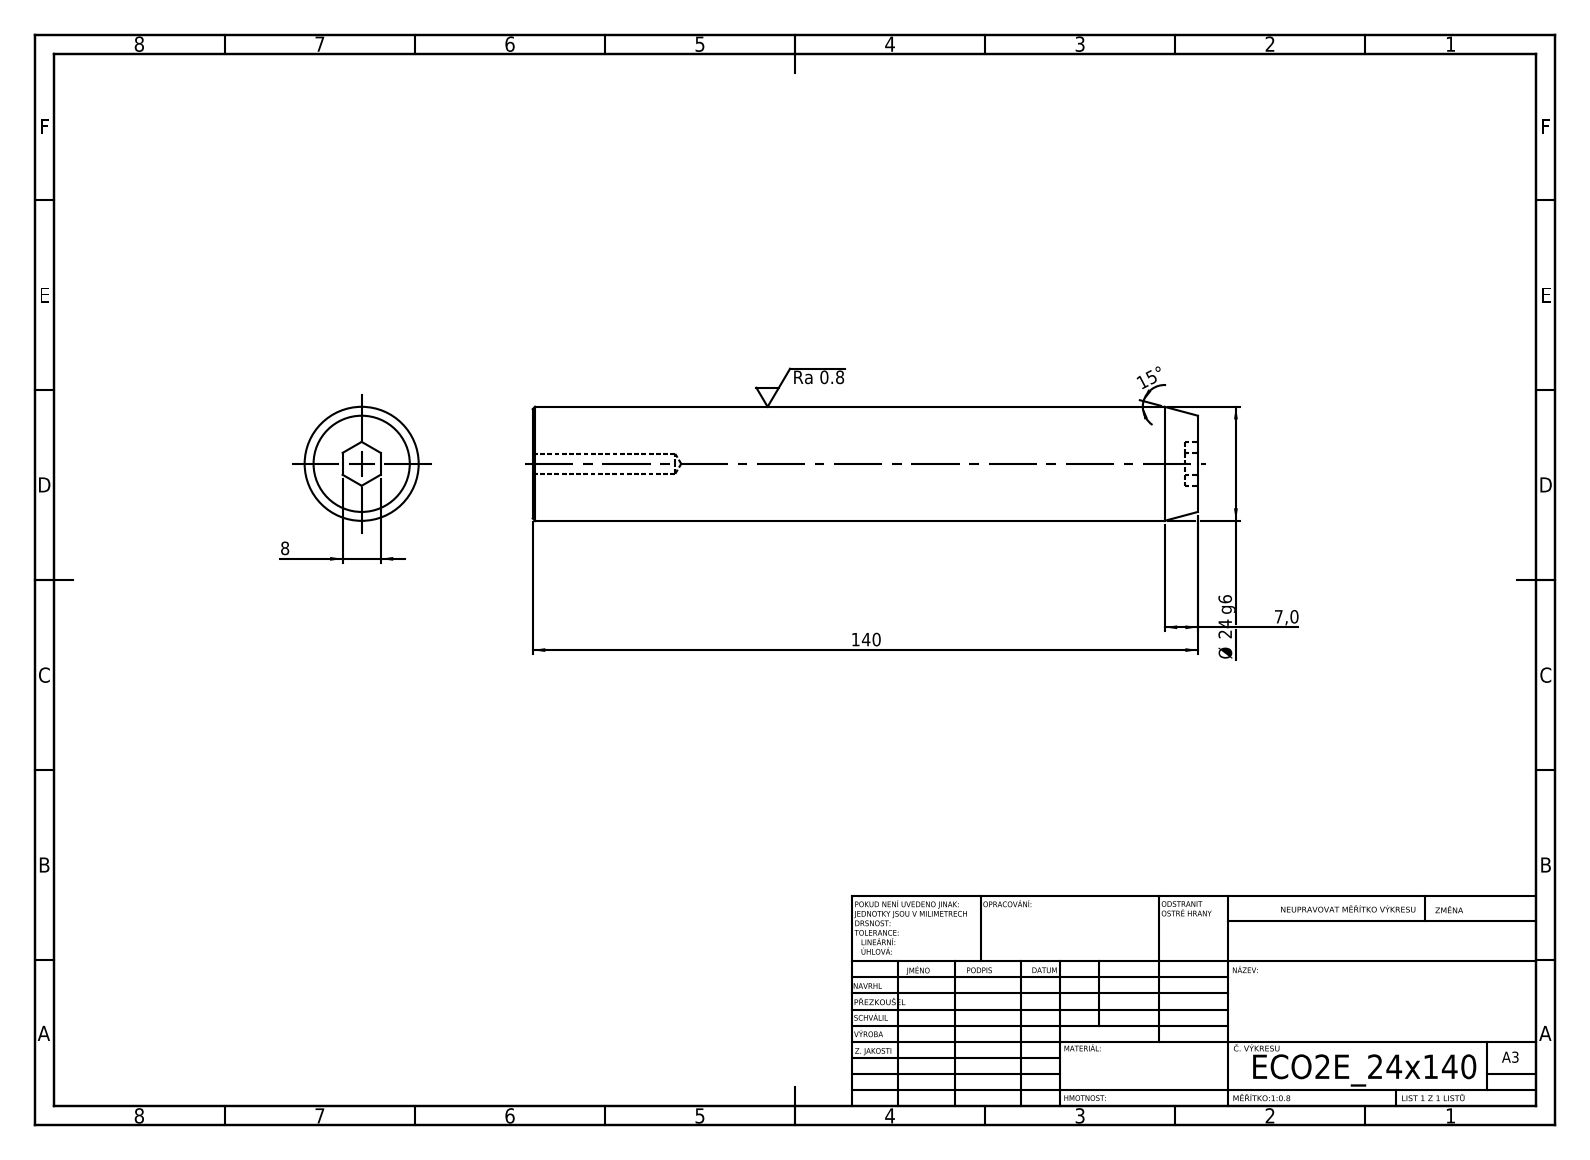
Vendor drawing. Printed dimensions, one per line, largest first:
140
Ø 24 g6
15°
8
7,0
